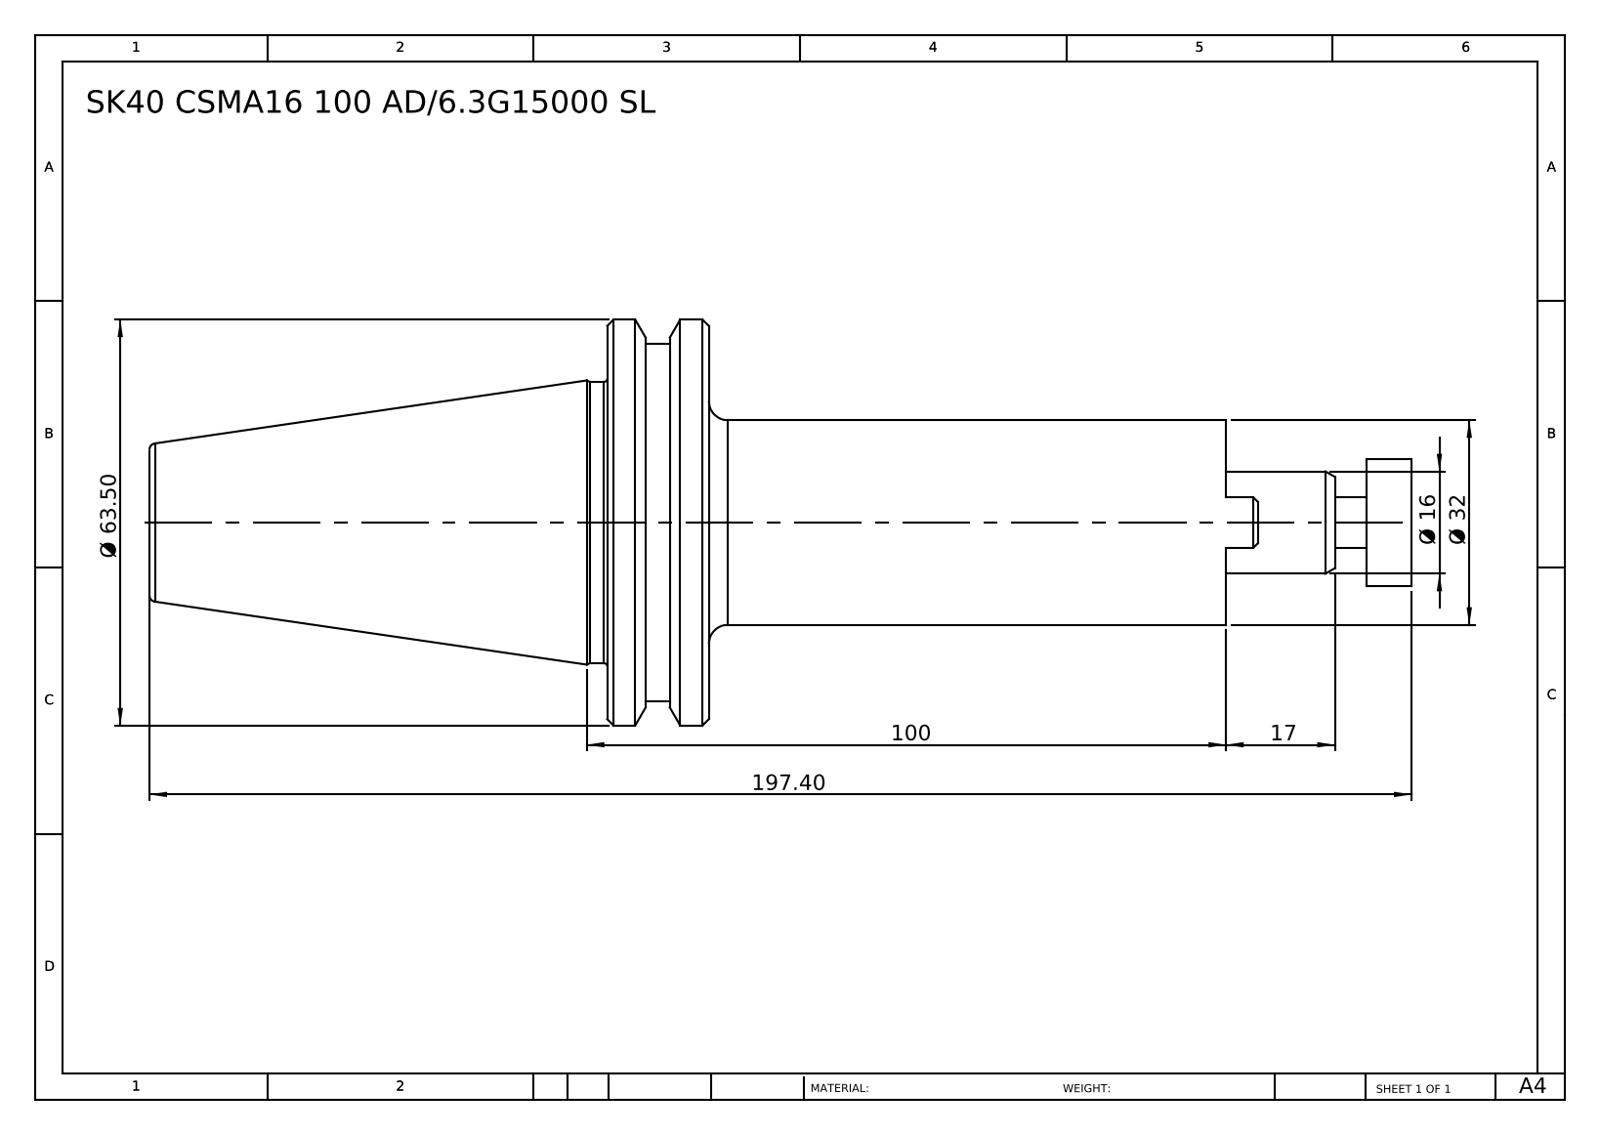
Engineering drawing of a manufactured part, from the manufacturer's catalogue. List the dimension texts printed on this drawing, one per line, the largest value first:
197.40
100
Ø 63.50
Ø 32
17
Ø 16
